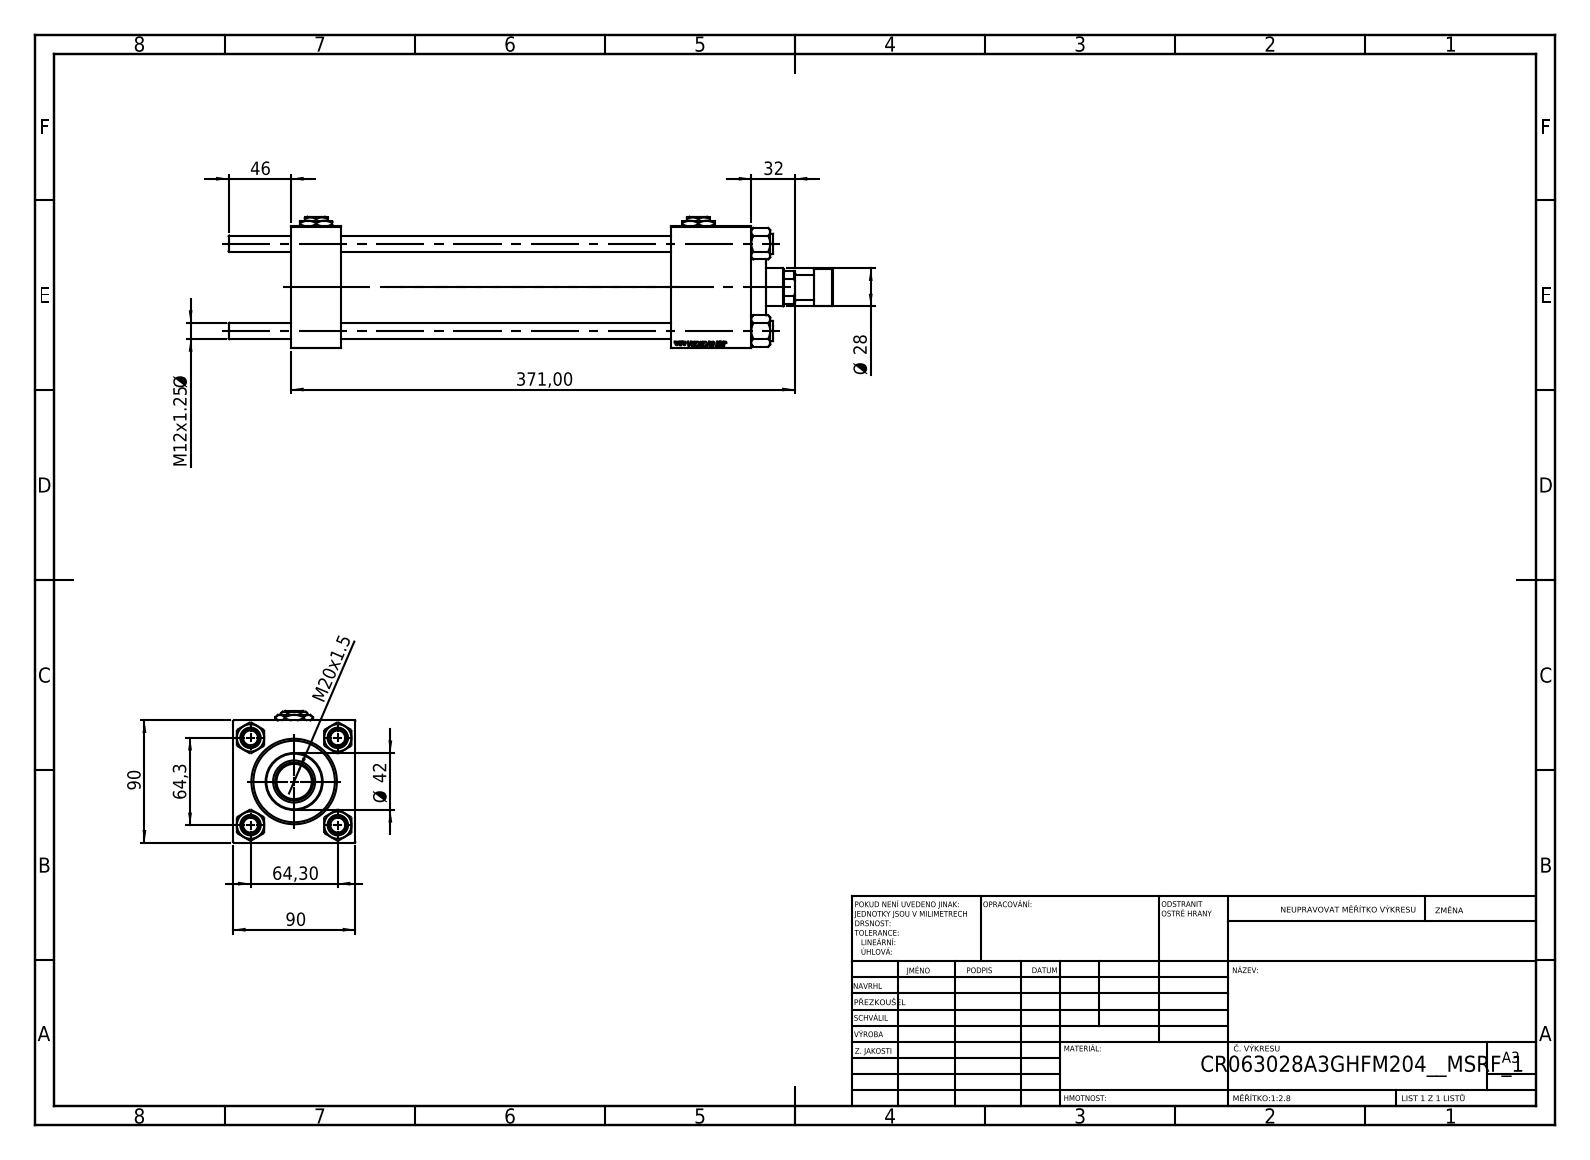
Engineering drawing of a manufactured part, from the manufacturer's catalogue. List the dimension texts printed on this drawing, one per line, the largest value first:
371,00
90
90
64,3
64,30
46
Ø 42
32
Ø 28
M20x1.5
M12x1.25 Ø
